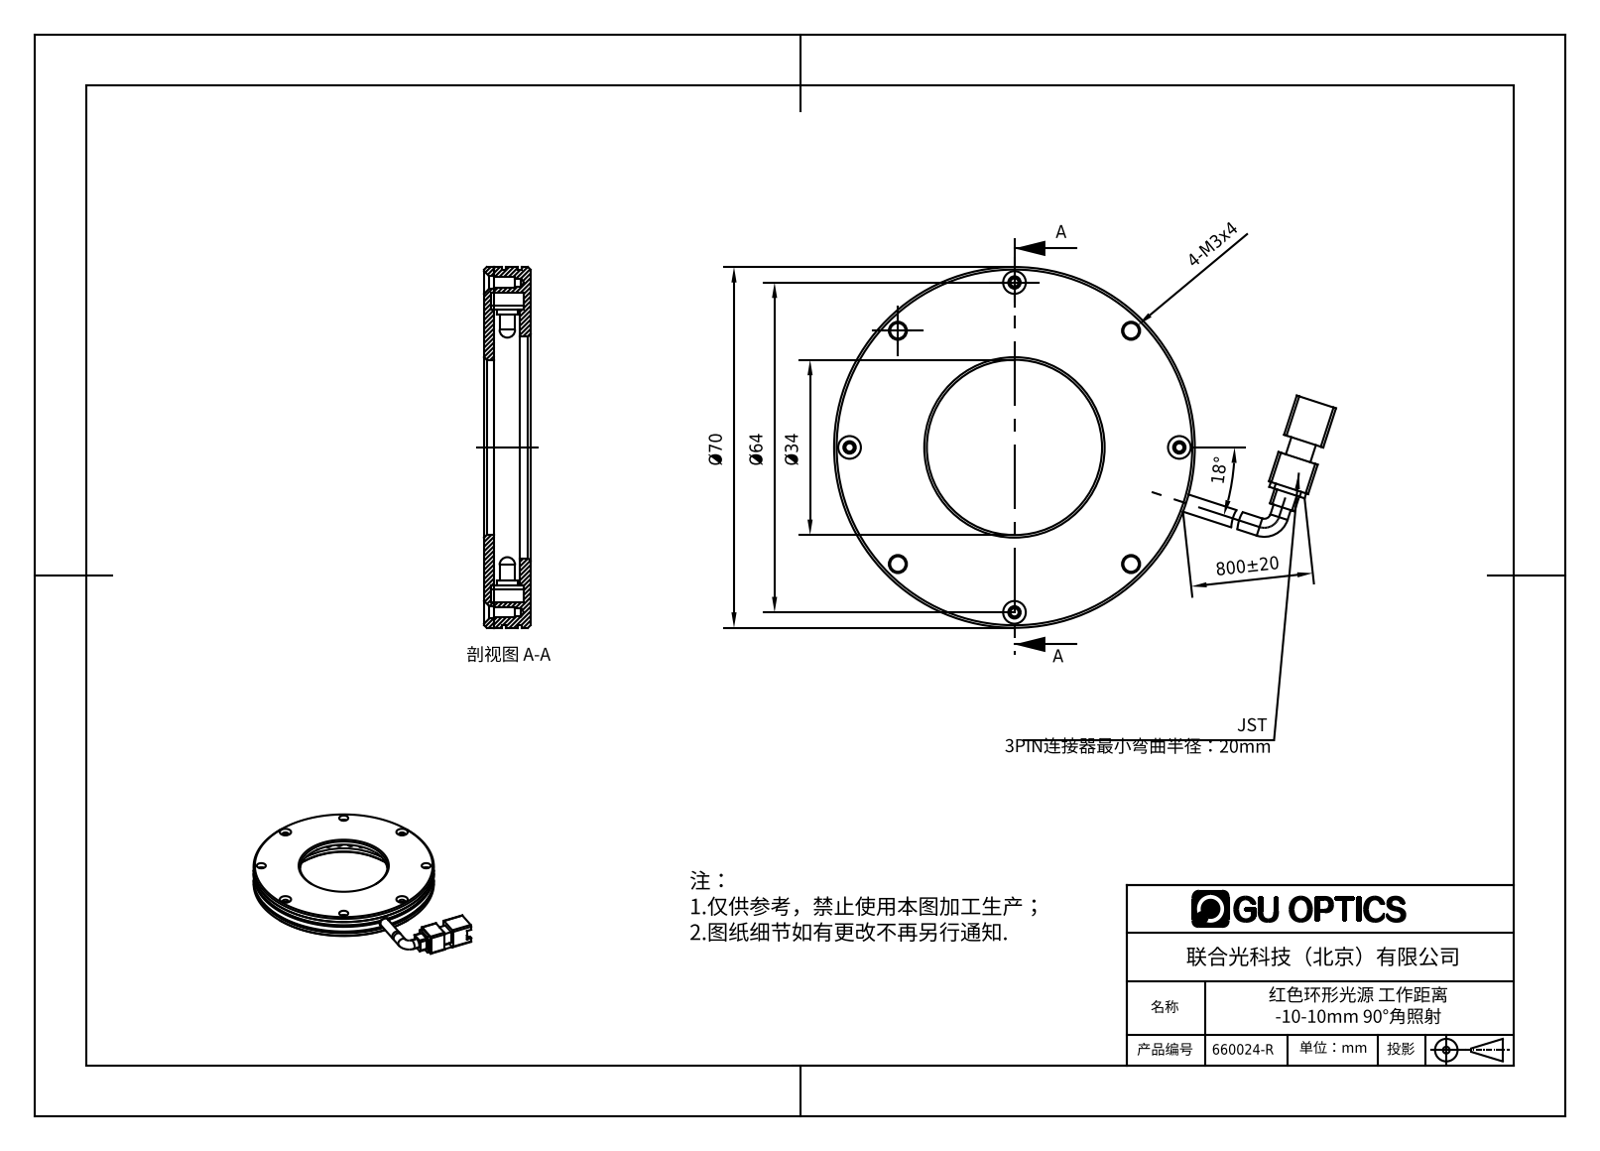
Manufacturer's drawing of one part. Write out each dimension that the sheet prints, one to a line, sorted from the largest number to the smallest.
800±20
Ø70
Ø64
Ø34
18°
4-M3x4
